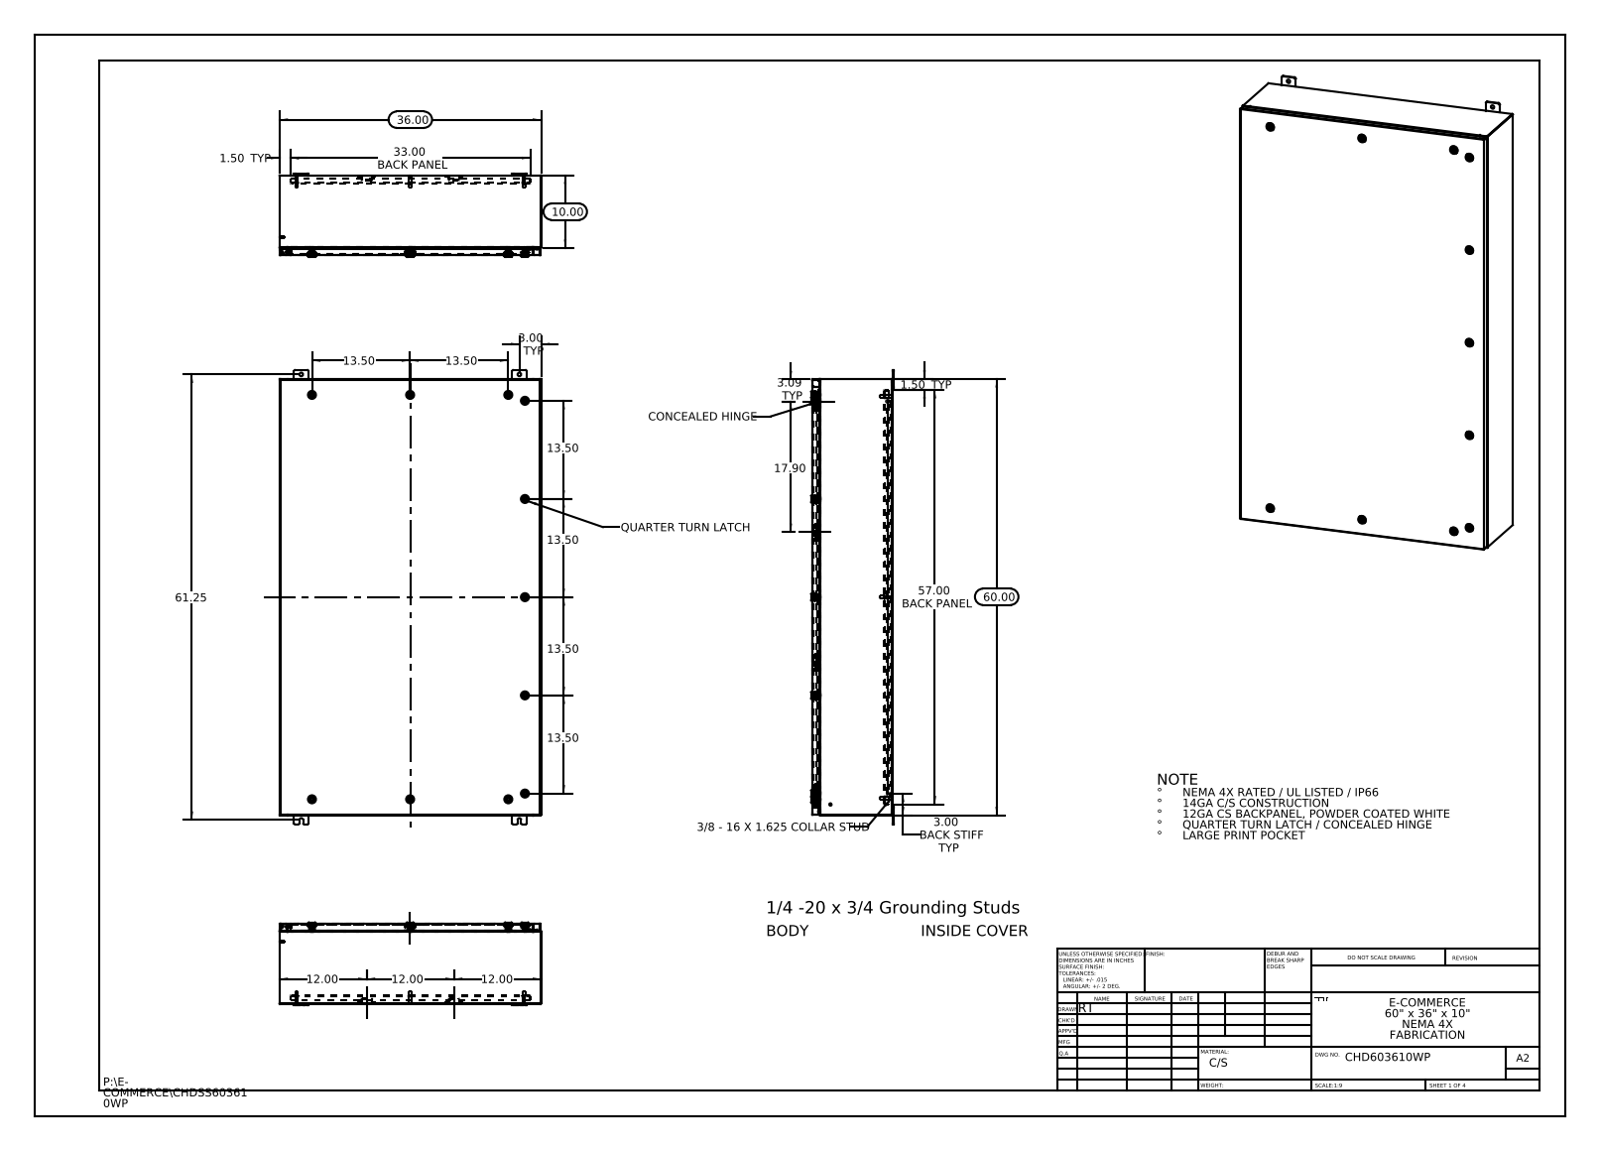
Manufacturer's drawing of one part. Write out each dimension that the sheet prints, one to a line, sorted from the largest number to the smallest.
61.25
60.00
57.00 BACK PANEL
36.00
33.00 BACK PANEL
17.90
13.50
13.50
13.50
13.50
13.50
13.50
12.00
12.00
12.00
10.00
3.09 TYP
3.00 TYP
3.00 BACK STIFF TYP
1.50 TYP
1.50 TYP
